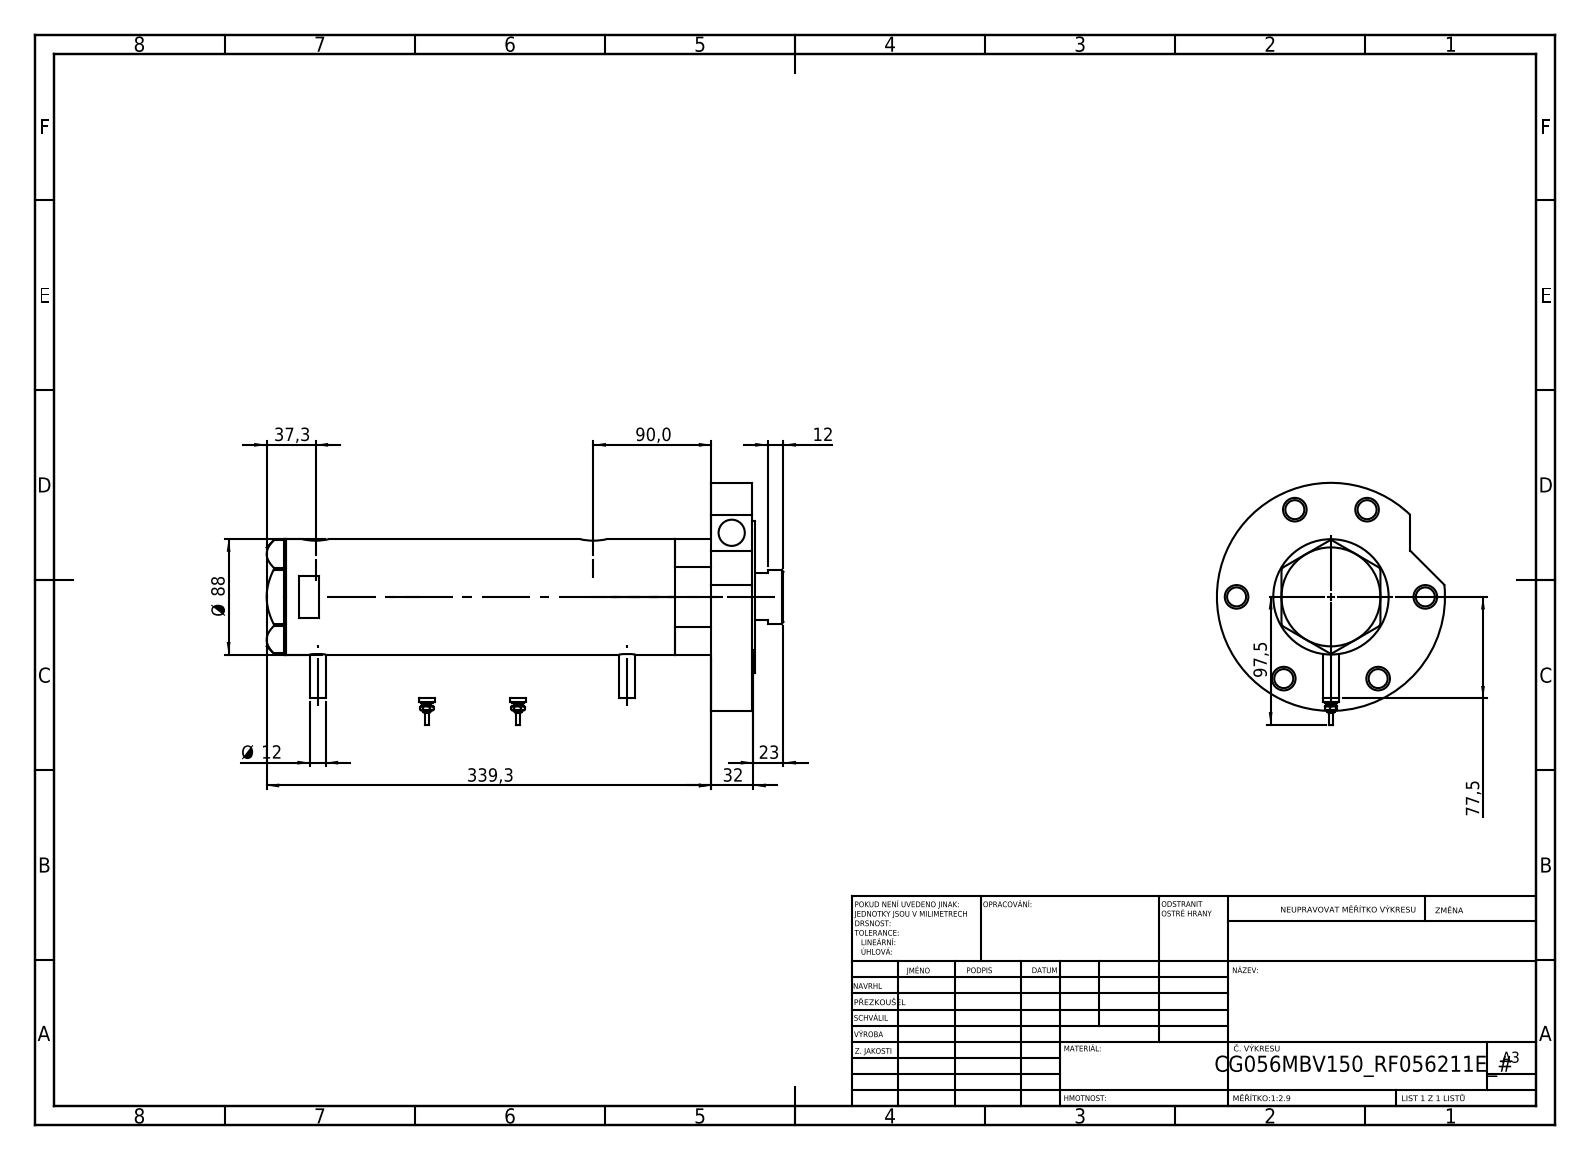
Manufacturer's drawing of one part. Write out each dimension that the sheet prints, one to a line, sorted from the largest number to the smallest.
339,3
97,5
90,0
Ø 88
77,5
37,3
32
23
12
Ø 12
